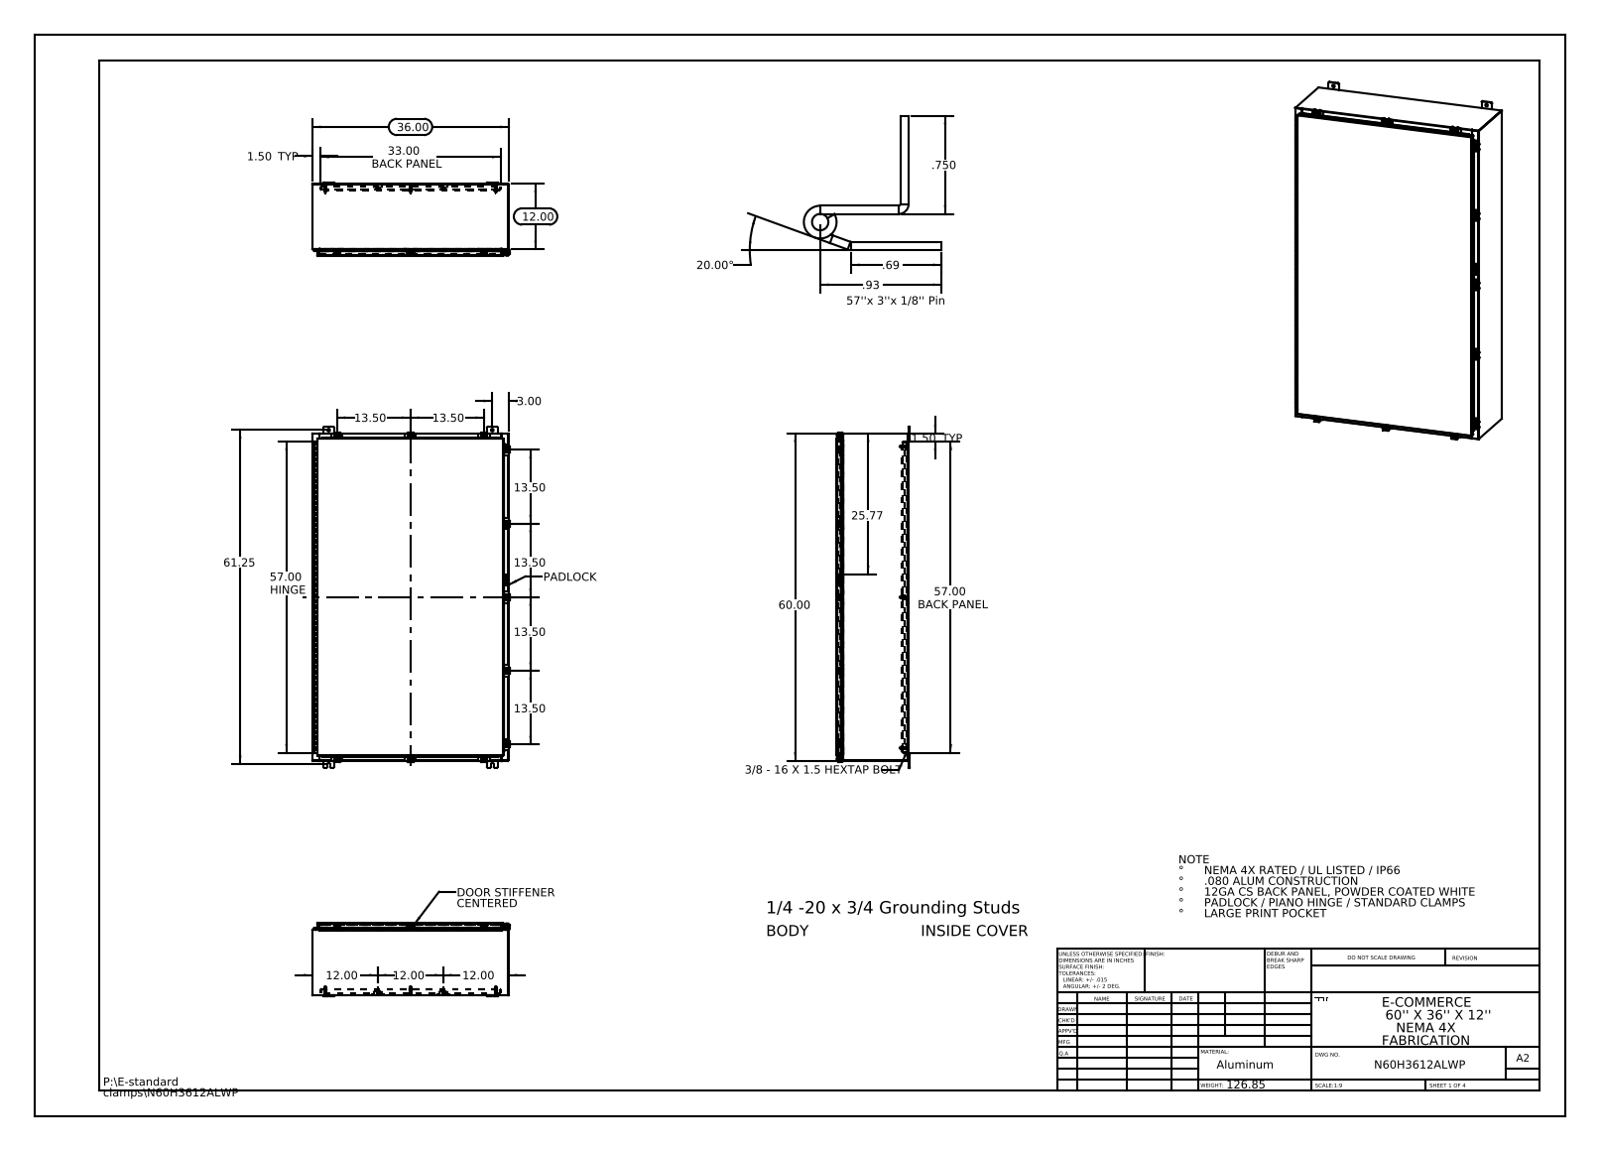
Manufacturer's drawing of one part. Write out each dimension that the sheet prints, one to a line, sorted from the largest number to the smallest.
61.25
60.00
57.00 HINGE
57.00 BACK PANEL
36.00
33.00 BACK PANEL
25.77
20.00°
13.50
13.50
13.50
13.50
13.50
13.50
12.00
12.00
12.00
12.00
3.00
1.50 TYP
1.50 TYP
.93
.750
.69
